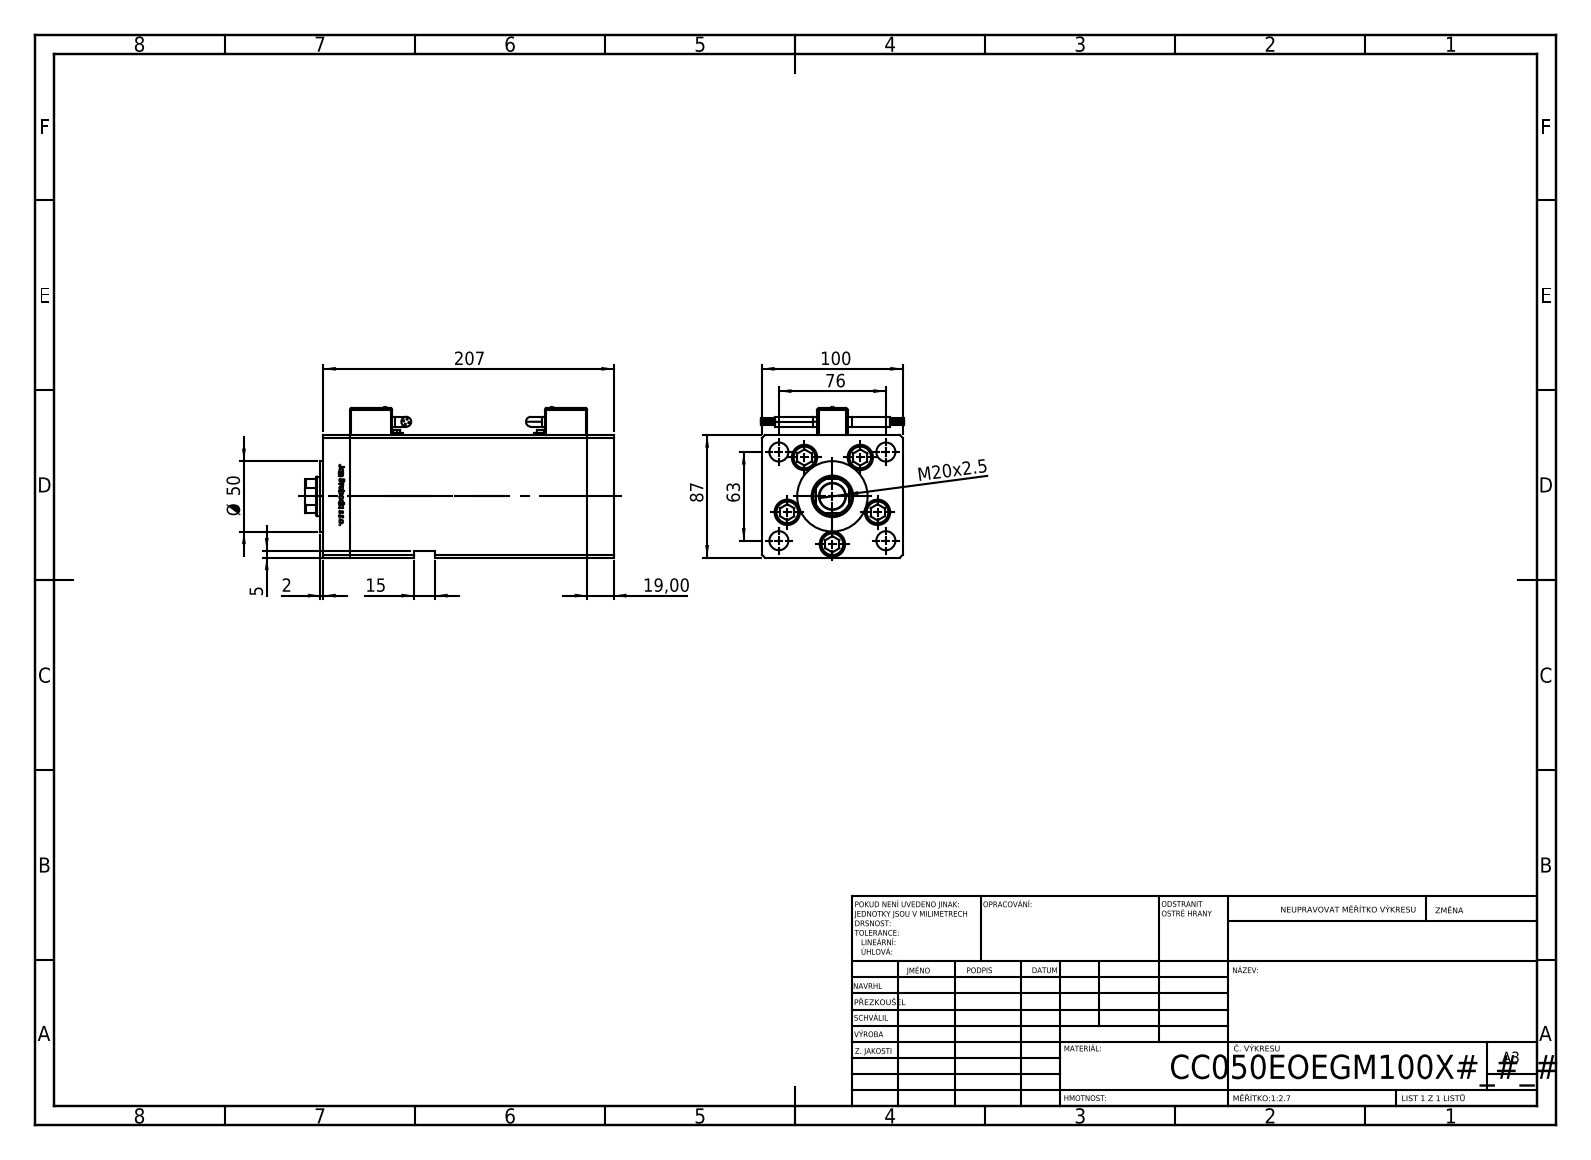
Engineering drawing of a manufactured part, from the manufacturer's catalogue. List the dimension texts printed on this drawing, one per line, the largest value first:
207
100
87
76
63
Ø 50
M20x2.5
19,00
15
5
2
